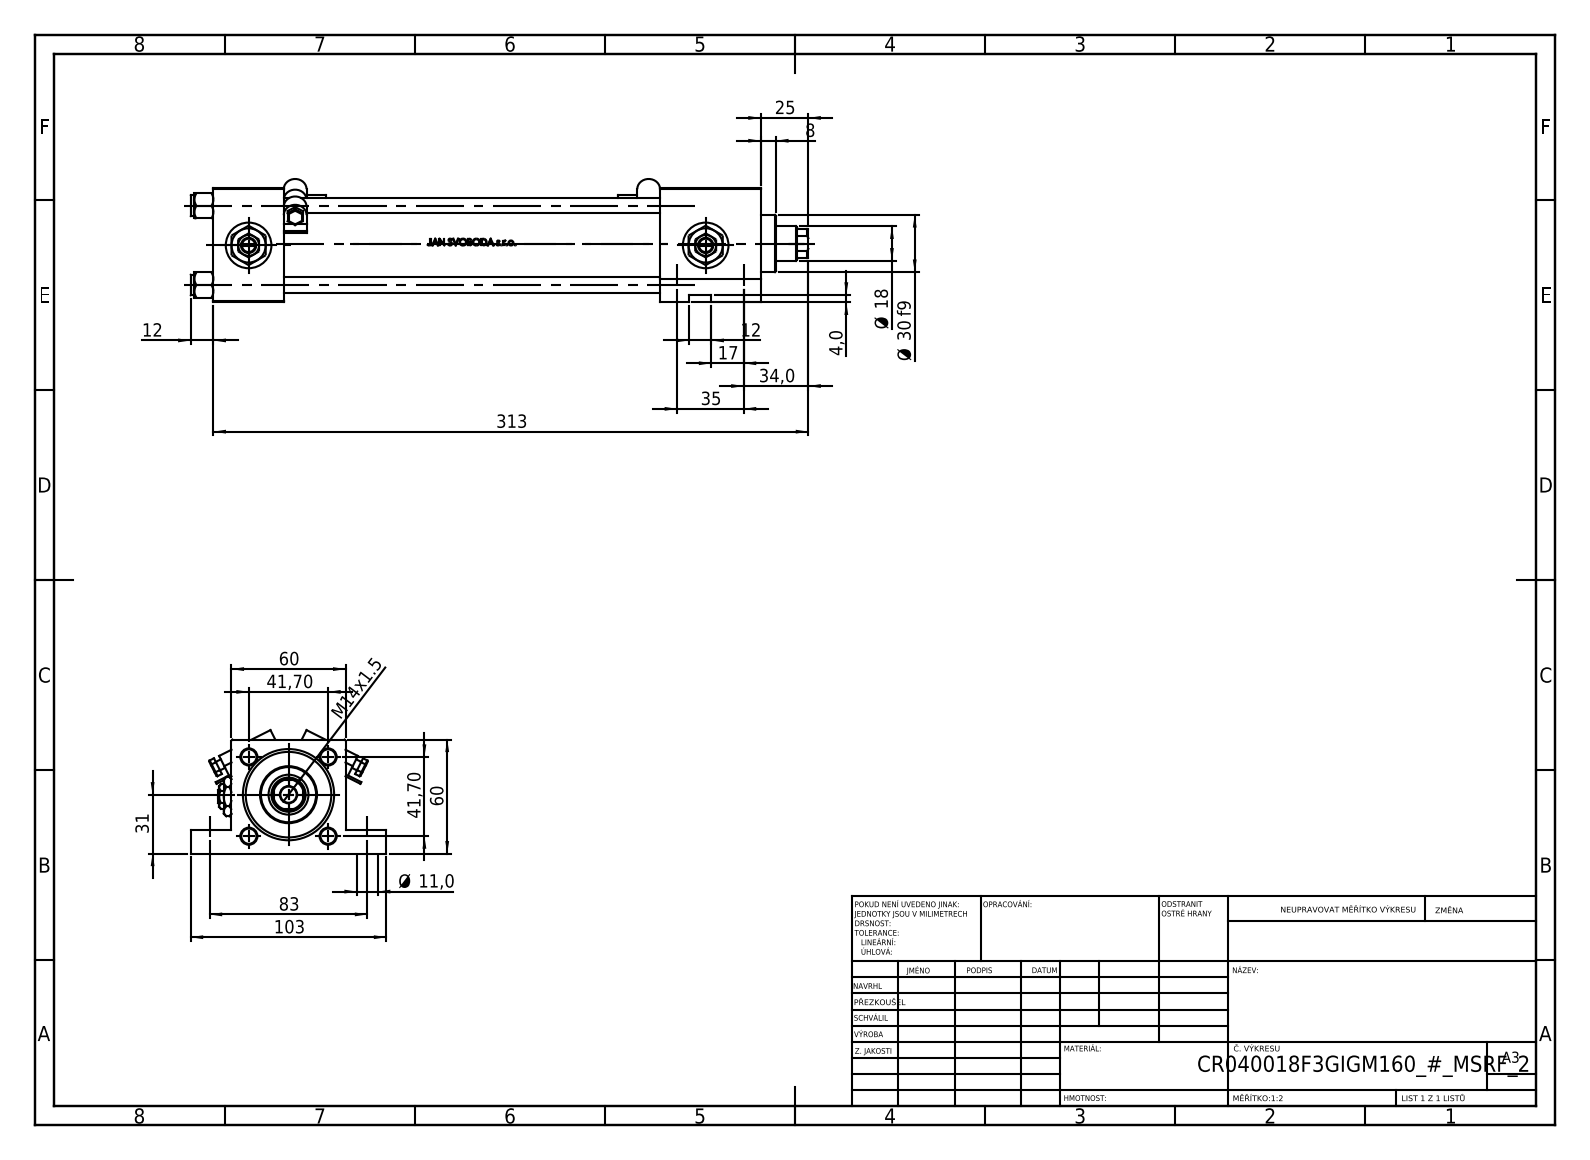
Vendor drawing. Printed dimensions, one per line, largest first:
313
103
83
60
60
41,70
41,70
35
34,0
31
Ø 30 f9
25
Ø 18
17
M14x1.5
12
12
Ø 11,0
8
4,0
